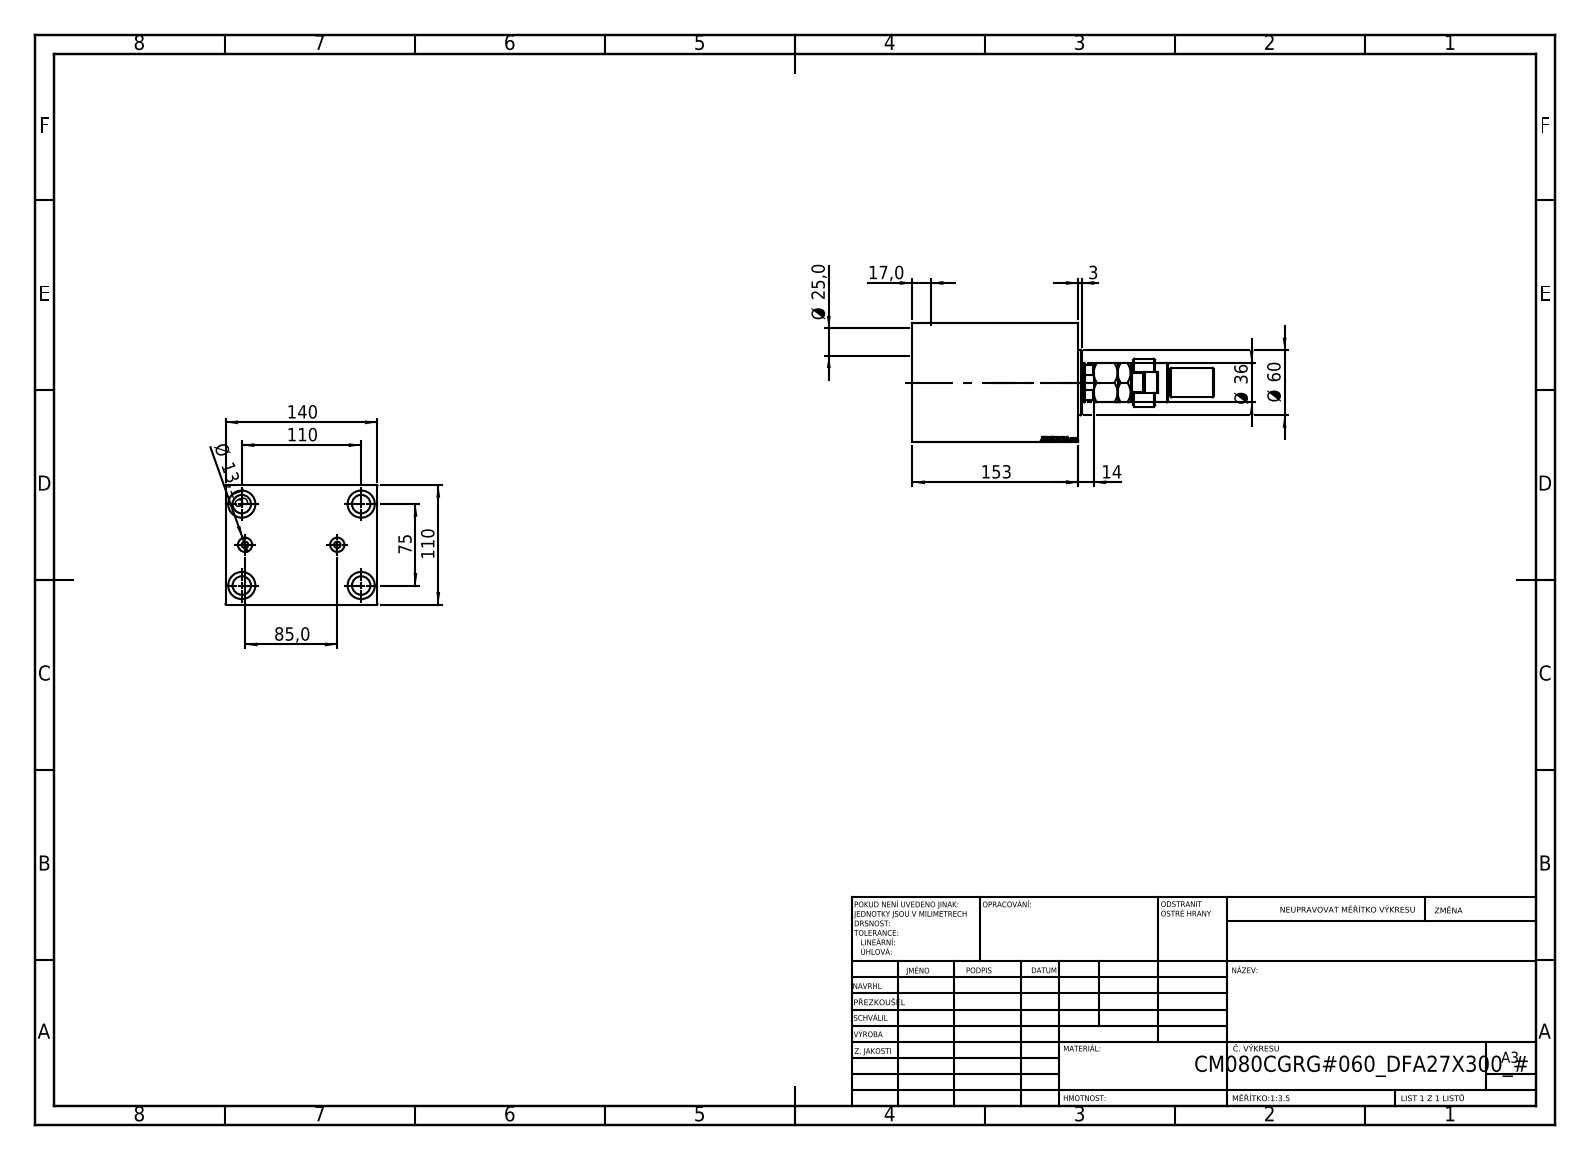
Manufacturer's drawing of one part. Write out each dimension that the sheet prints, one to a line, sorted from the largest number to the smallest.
153
140
110
110
85,0
75
Ø 60
Ø 36
Ø 25,0
17,0
14
Ø 13,16
3
